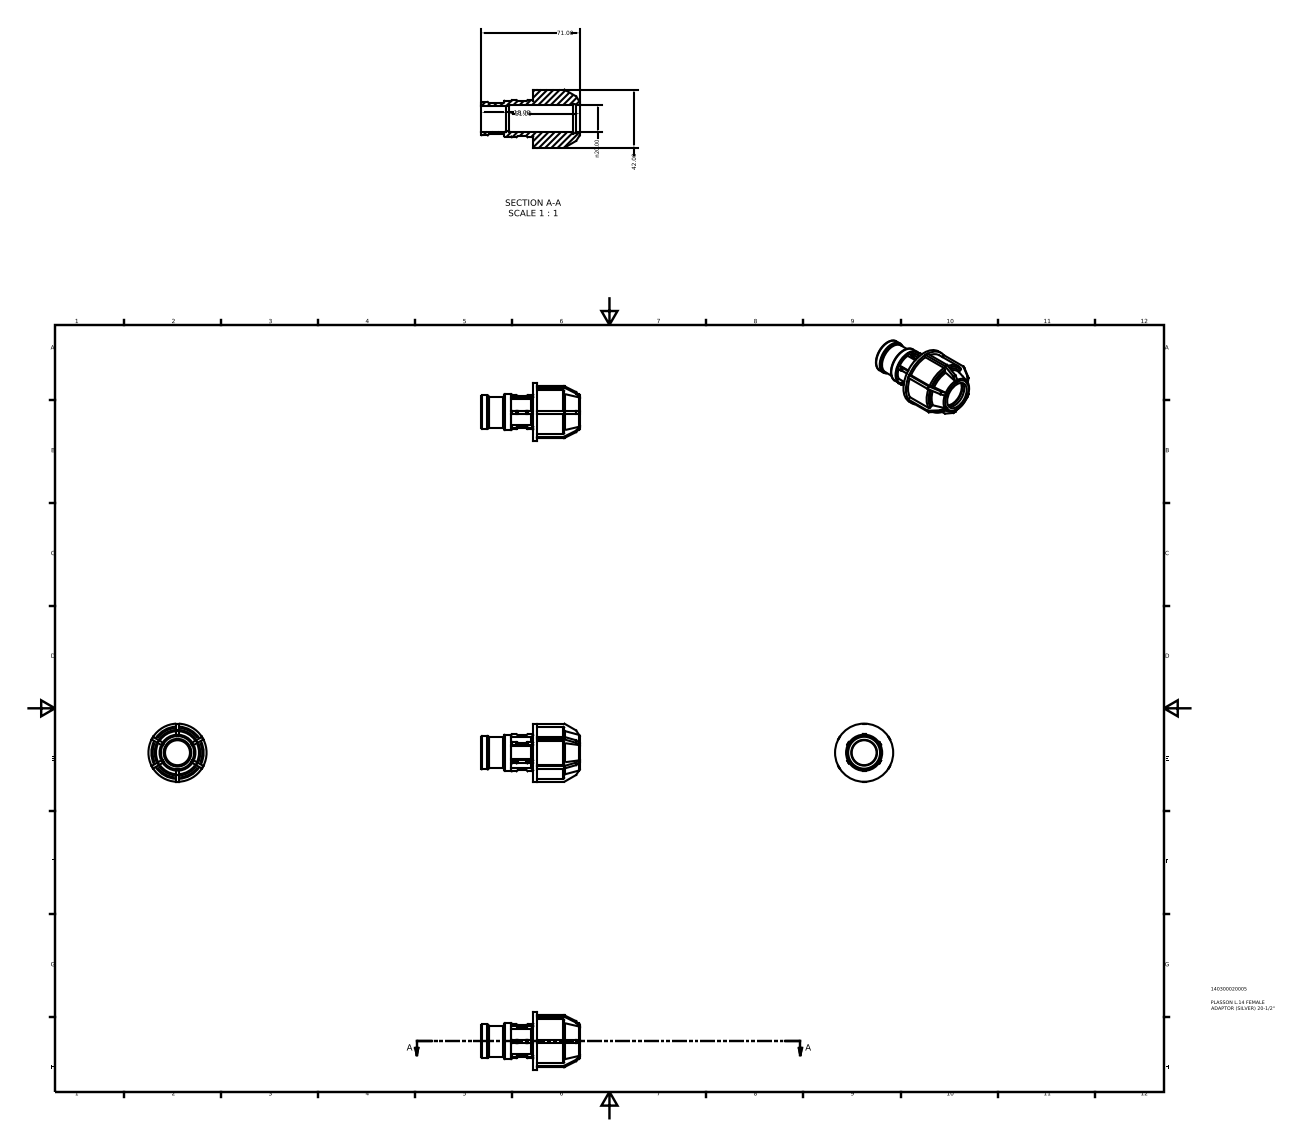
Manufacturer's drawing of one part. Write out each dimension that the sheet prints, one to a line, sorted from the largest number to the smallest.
71.00
51.00
42.00
n20.00
18.00
